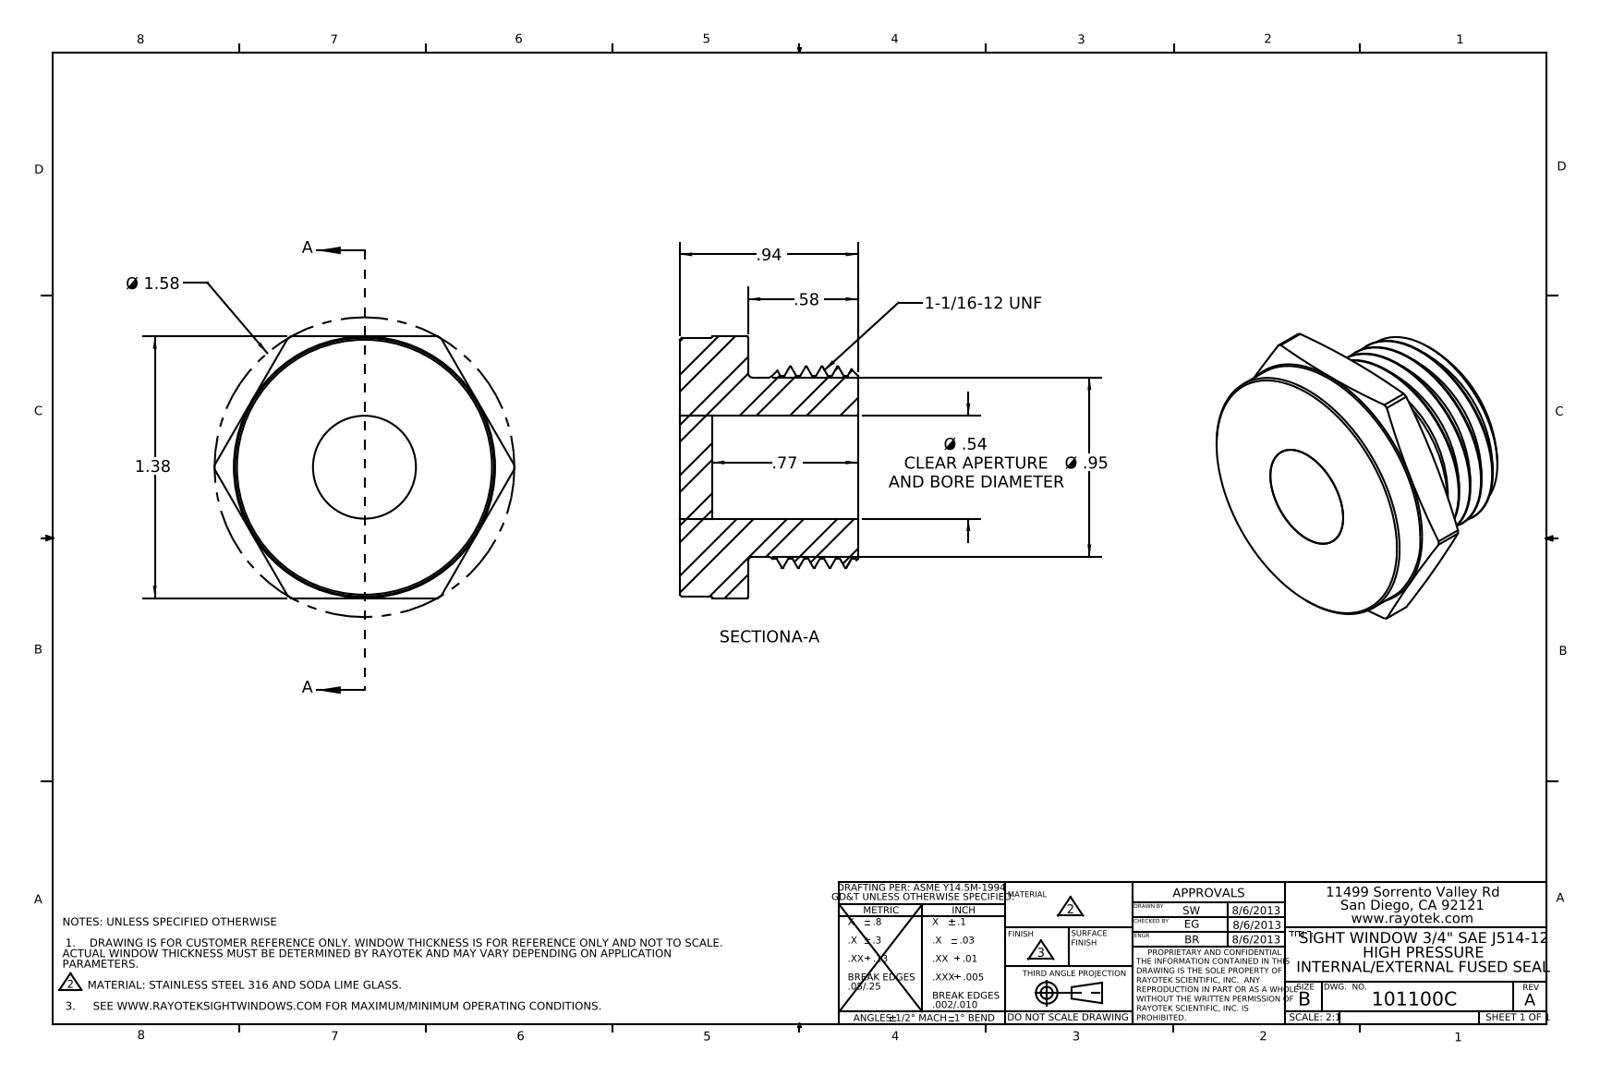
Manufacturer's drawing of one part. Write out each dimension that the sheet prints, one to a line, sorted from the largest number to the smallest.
Ø 1.58
1.38
Ø .95
.94
.77
.58
Ø .54 CLEAR APERTURE AND BORE DIAMETER
